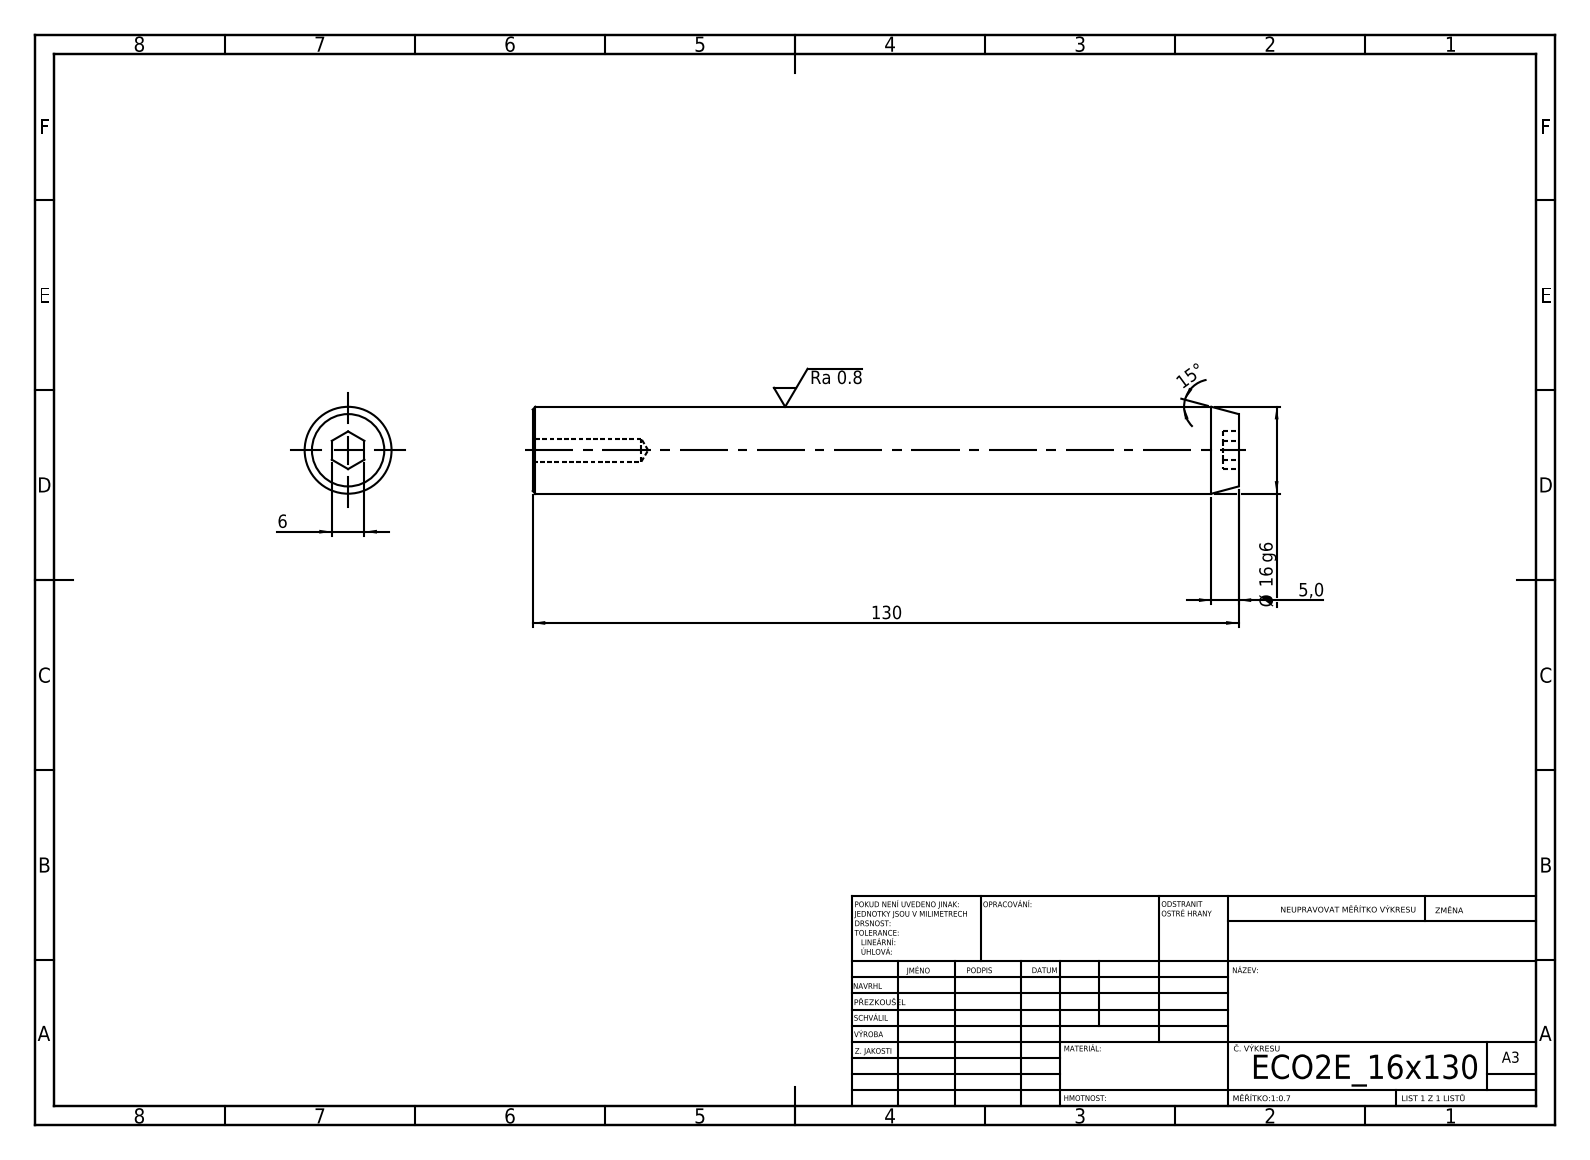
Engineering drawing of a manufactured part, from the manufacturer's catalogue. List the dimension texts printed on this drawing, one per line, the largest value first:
130
Ø 16 g6
15°
6
5,0
